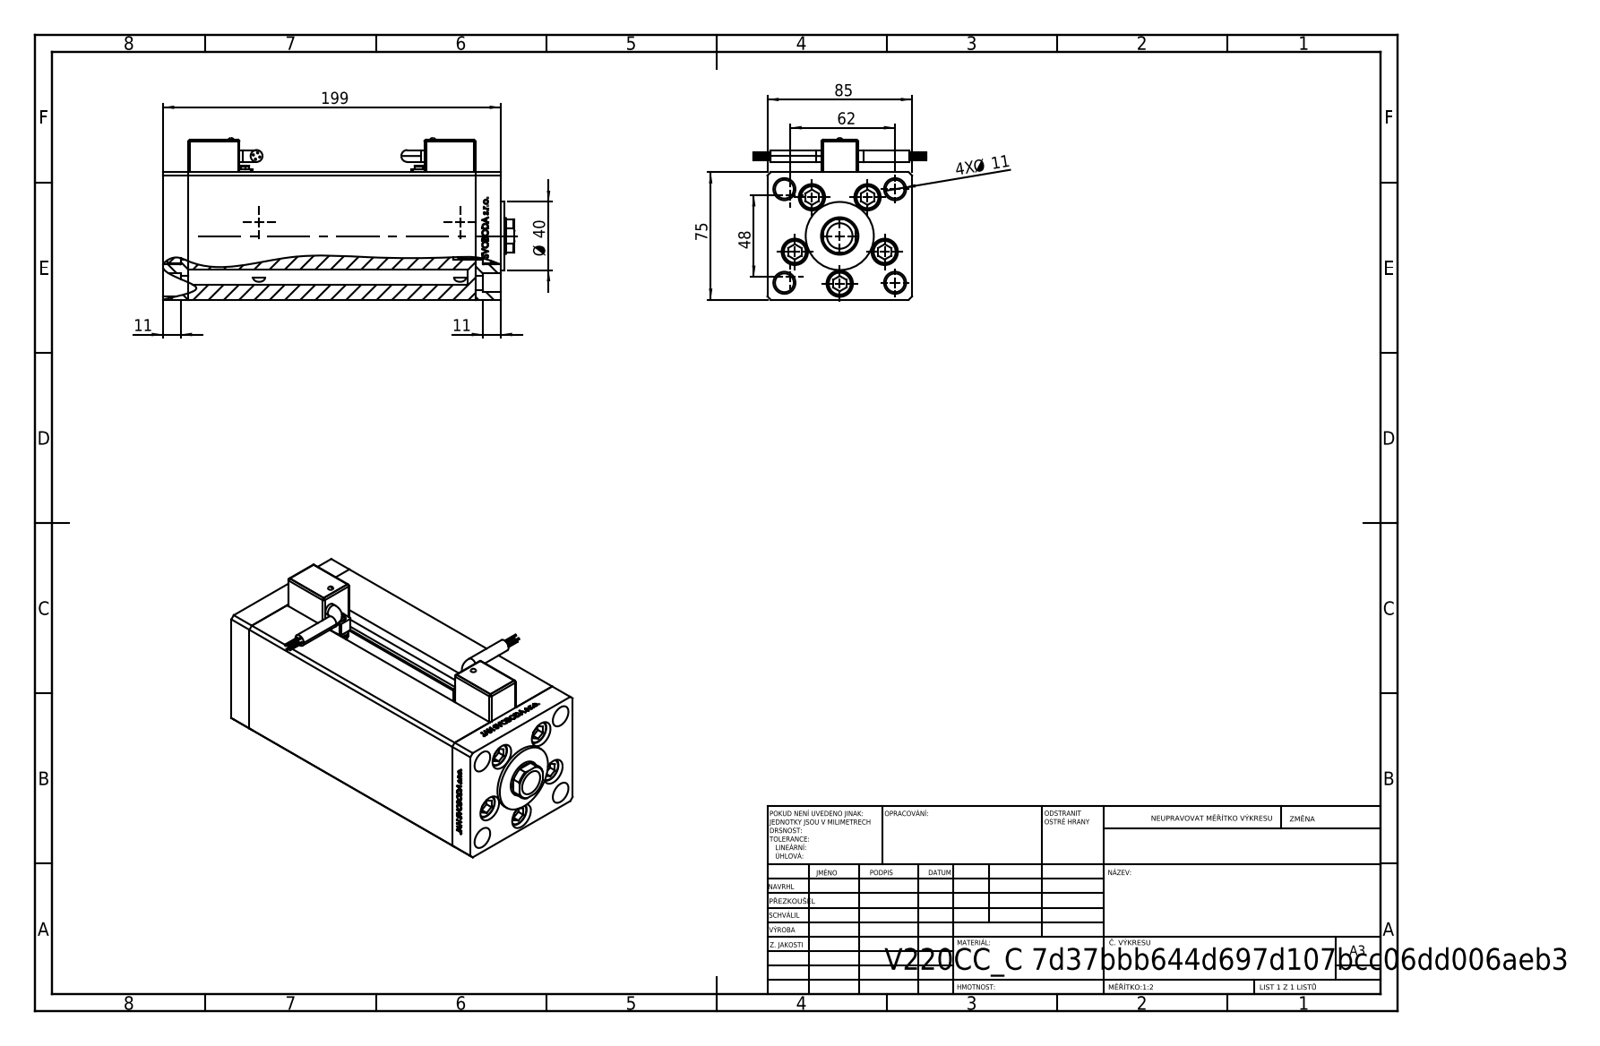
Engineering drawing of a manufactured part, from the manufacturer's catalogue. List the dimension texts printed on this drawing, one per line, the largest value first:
199
85
75
62
48
Ø 40
11
11
4X Ø 11
